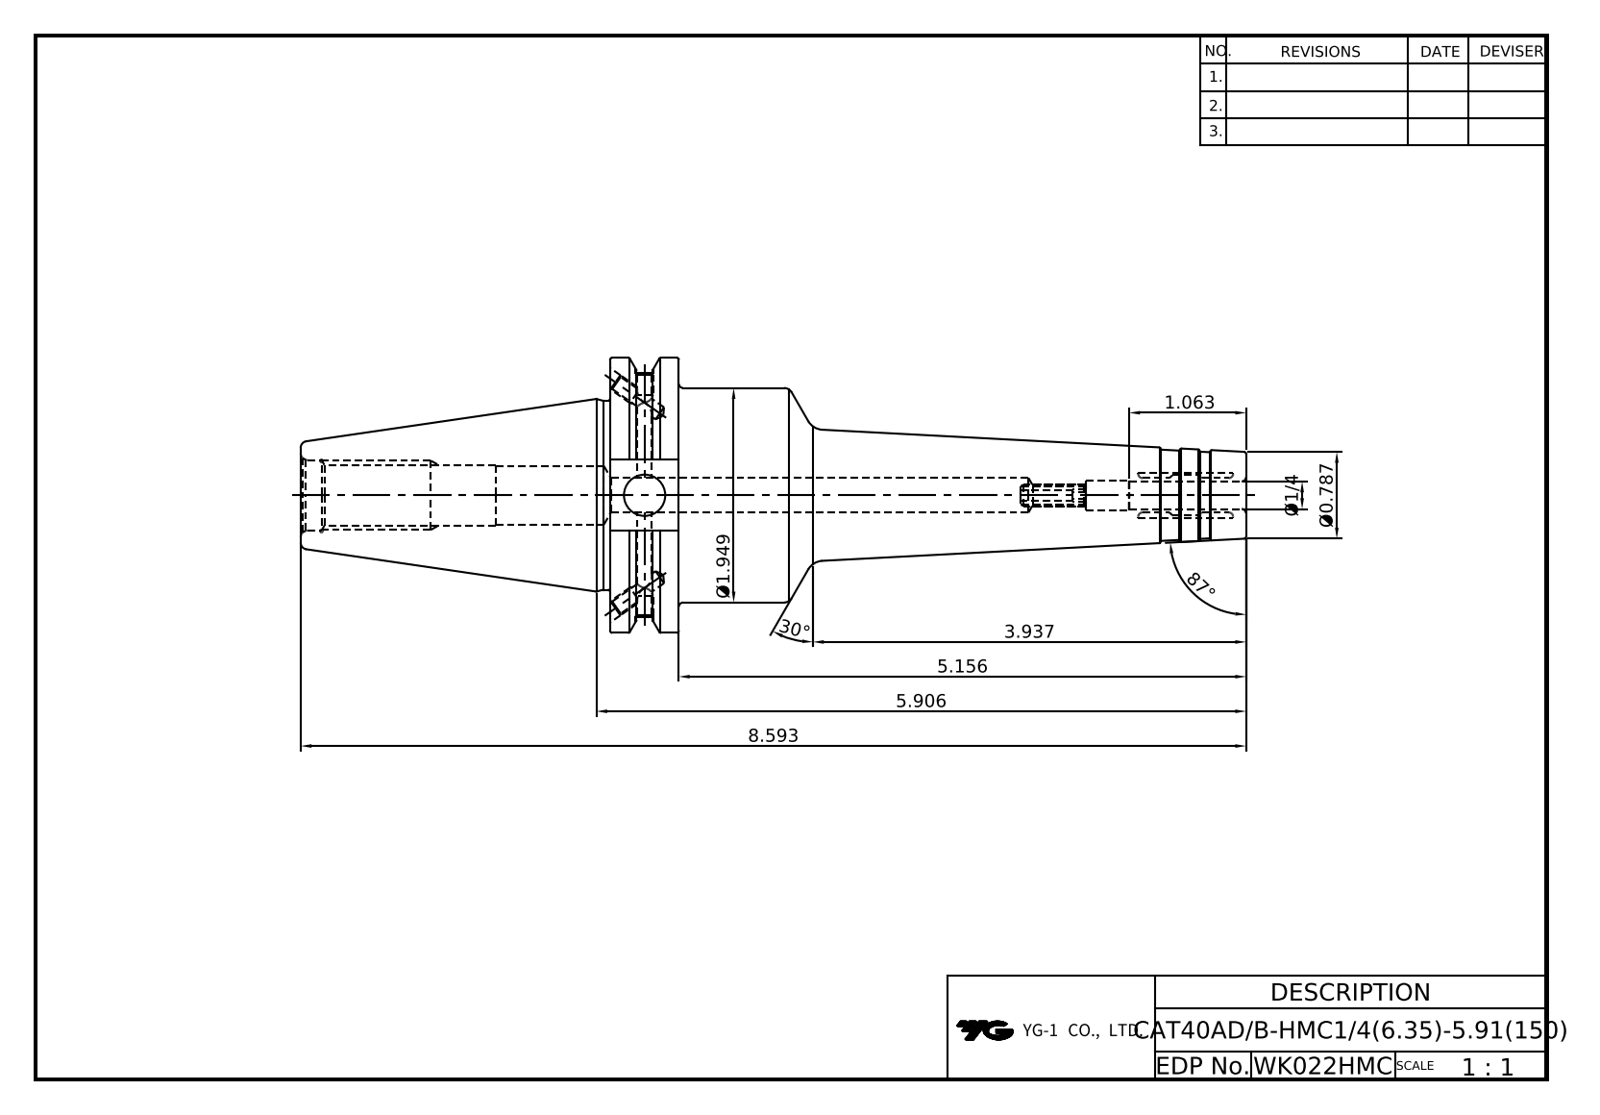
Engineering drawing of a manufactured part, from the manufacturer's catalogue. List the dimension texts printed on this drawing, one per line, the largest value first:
87°
30°
8.593
5.906
5.156
3.937
Ø1.949
1.063
Ø0.787
Ø1/4
